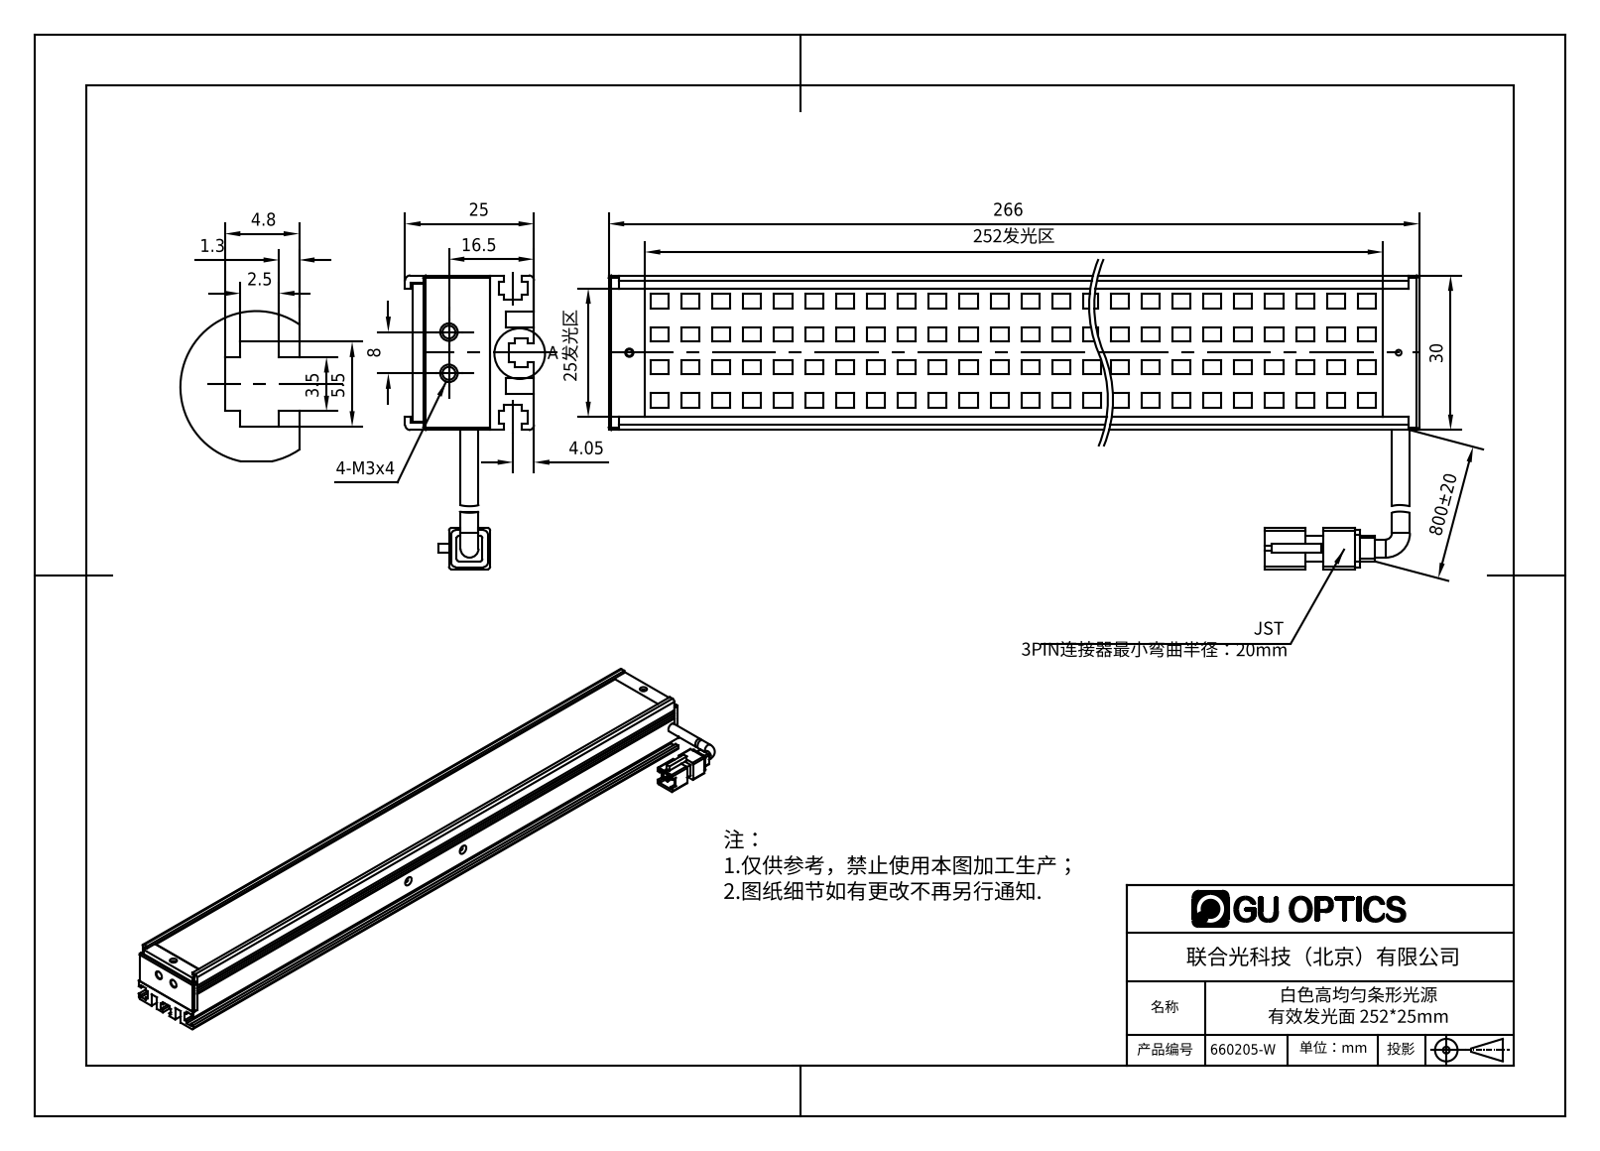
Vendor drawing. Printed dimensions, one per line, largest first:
800±20
266
252发光区
30
25发光区
25
16.5
8
5.5
4.8
4.05
3.5
2.5
1.3
